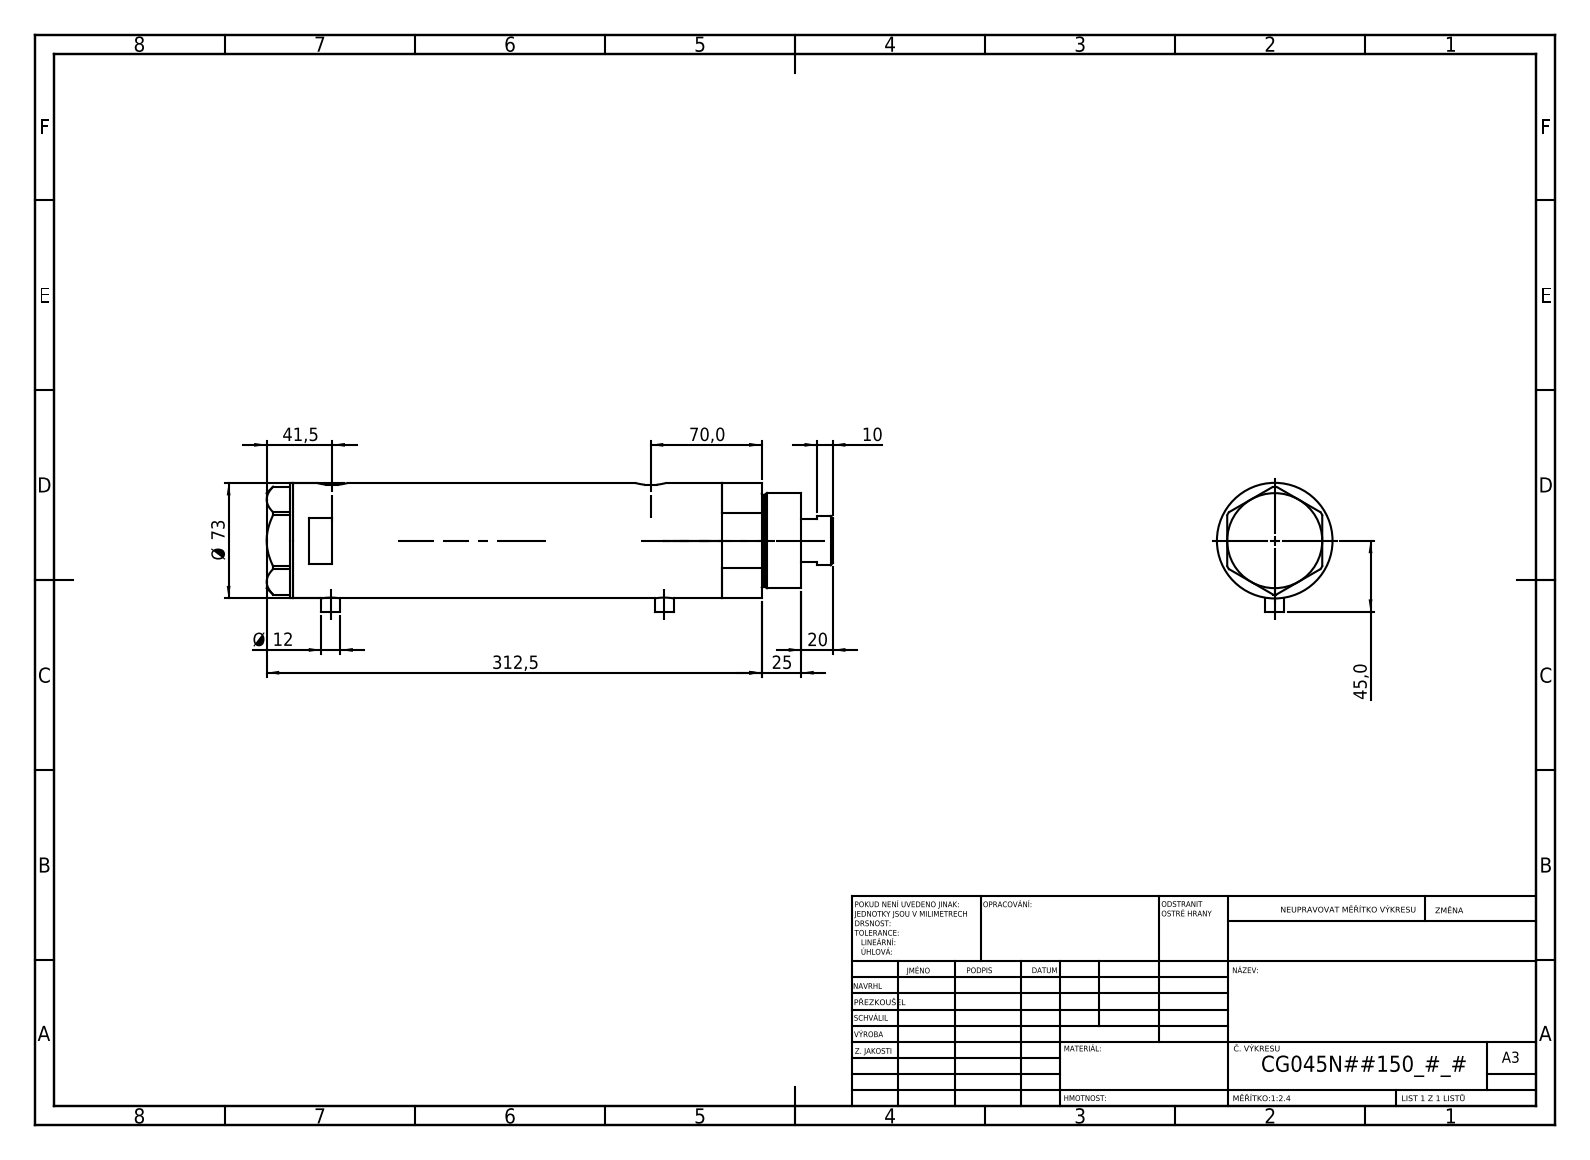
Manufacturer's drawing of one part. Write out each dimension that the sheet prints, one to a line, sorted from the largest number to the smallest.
312,5
Ø 73
70,0
45,0
41,5
25
20
Ø 12
10
